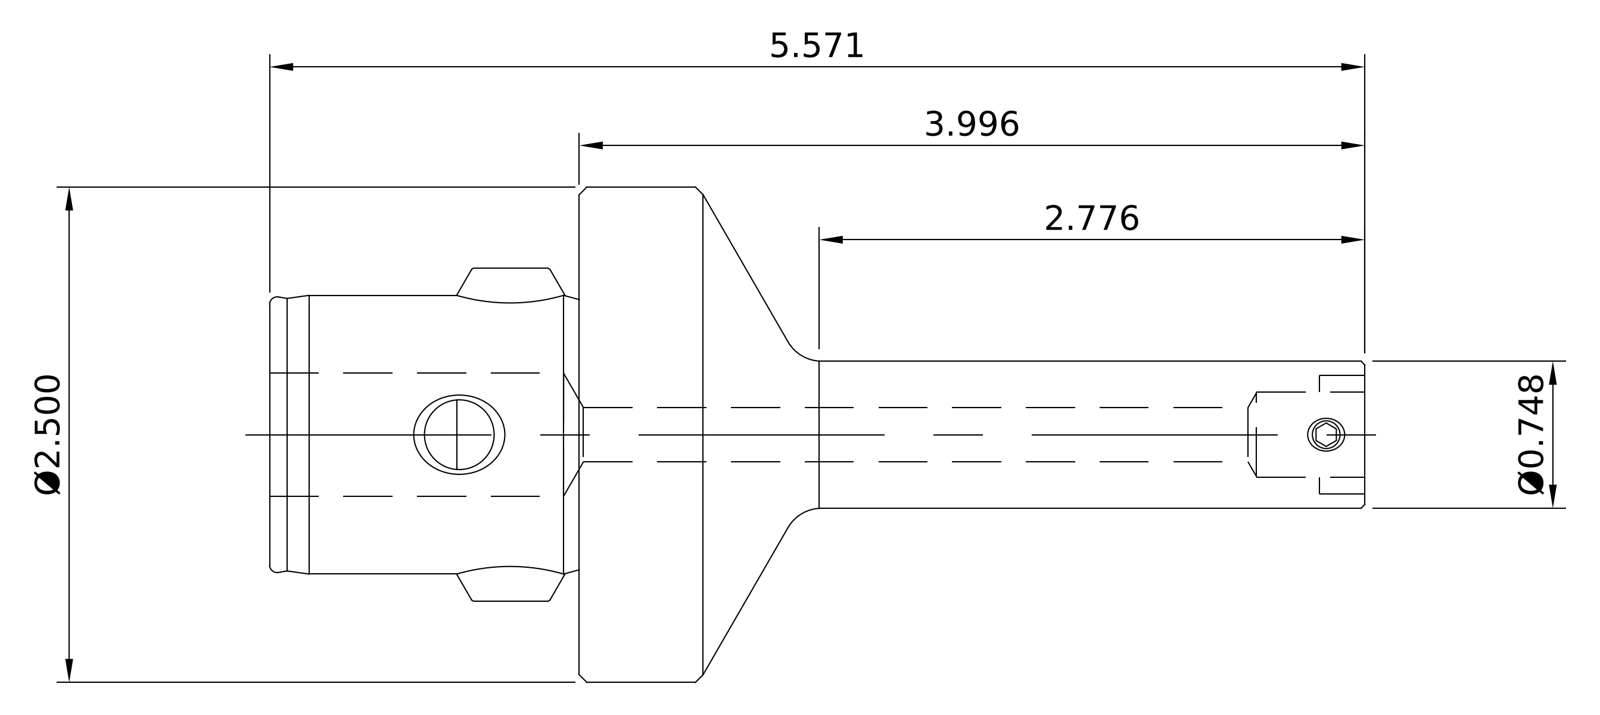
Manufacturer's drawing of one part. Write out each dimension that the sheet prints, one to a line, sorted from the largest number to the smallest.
5.571
3.996
2.776
Ø2.500
Ø0.748
